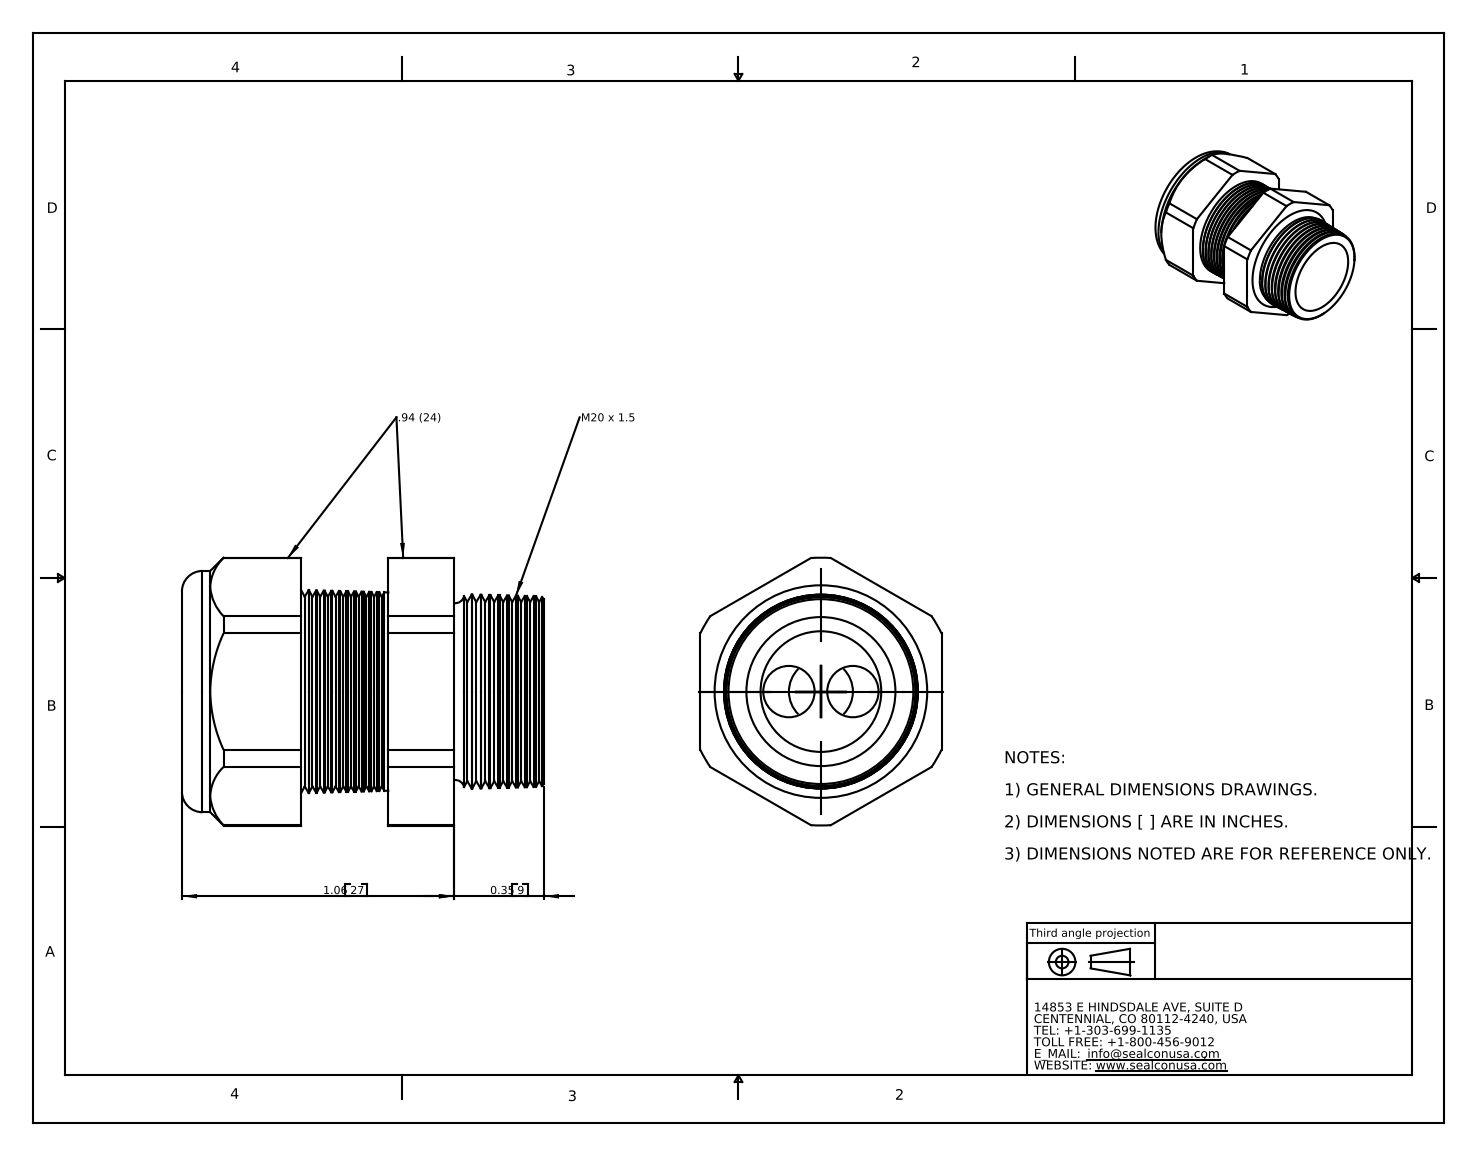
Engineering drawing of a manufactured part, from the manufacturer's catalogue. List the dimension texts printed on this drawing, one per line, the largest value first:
1.06 27
0.35 9
